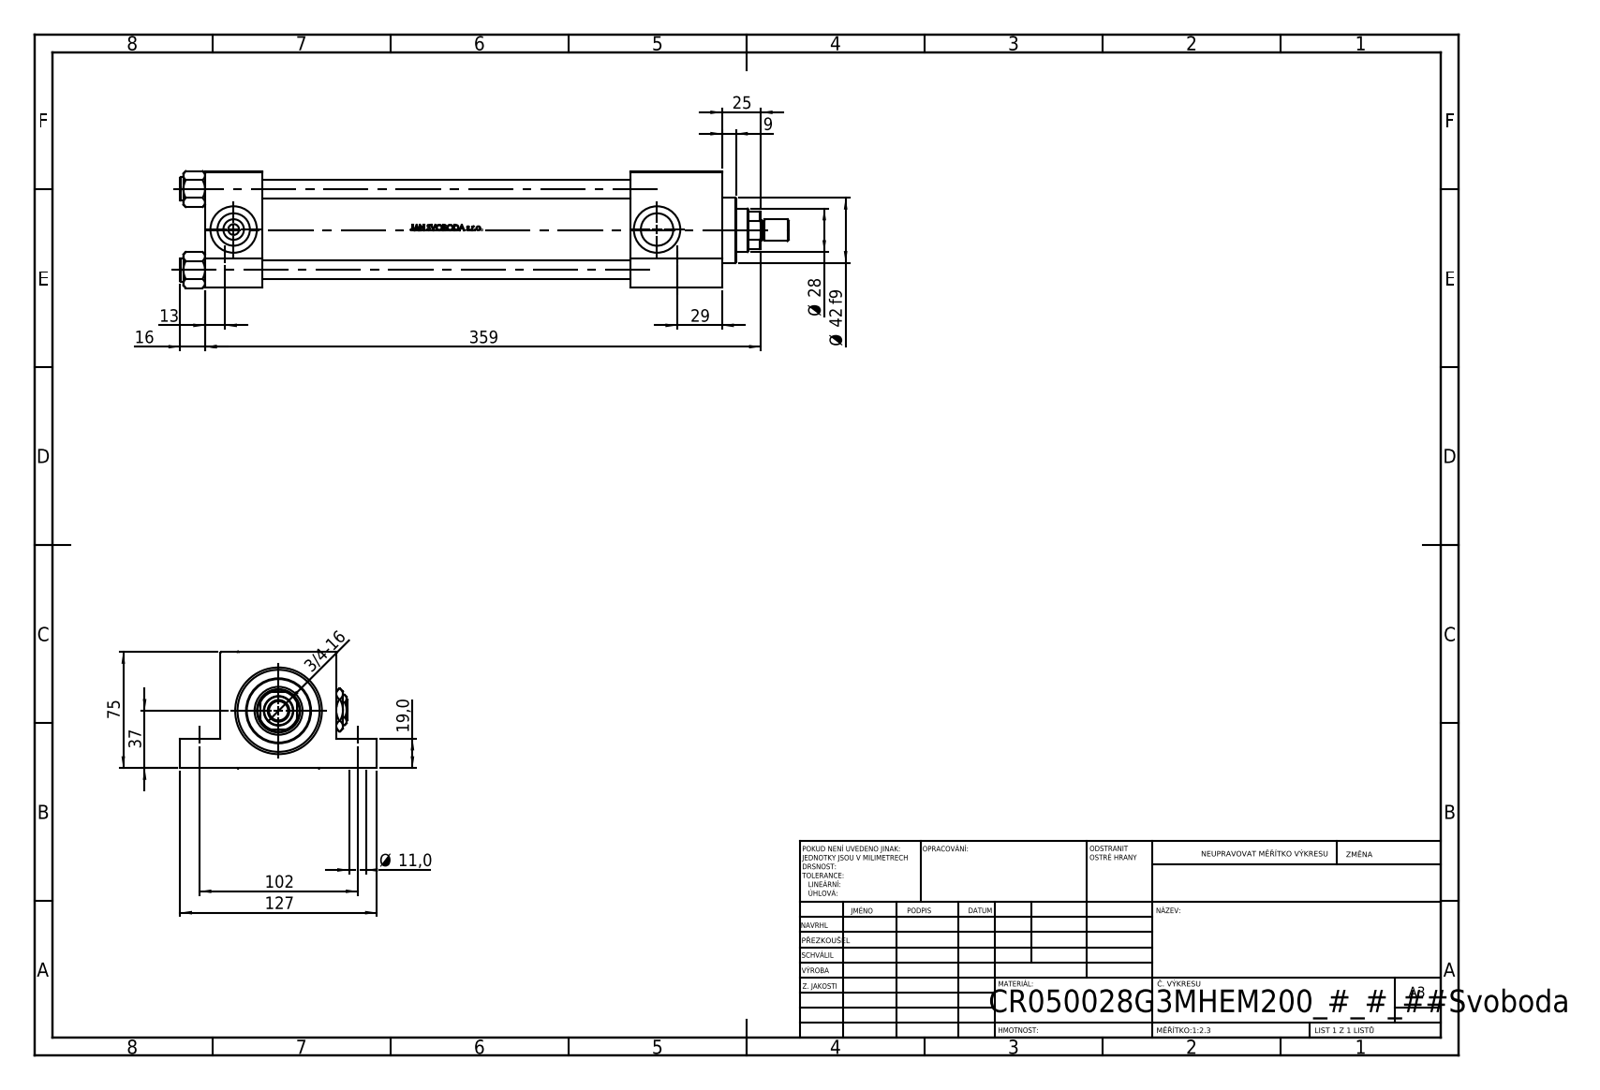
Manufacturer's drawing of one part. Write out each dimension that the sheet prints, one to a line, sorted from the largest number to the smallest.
359
127
102
75
Ø 42 f9
37
29
Ø 28
25
19,0
16
13
Ø 11,0
9
3/4-16
